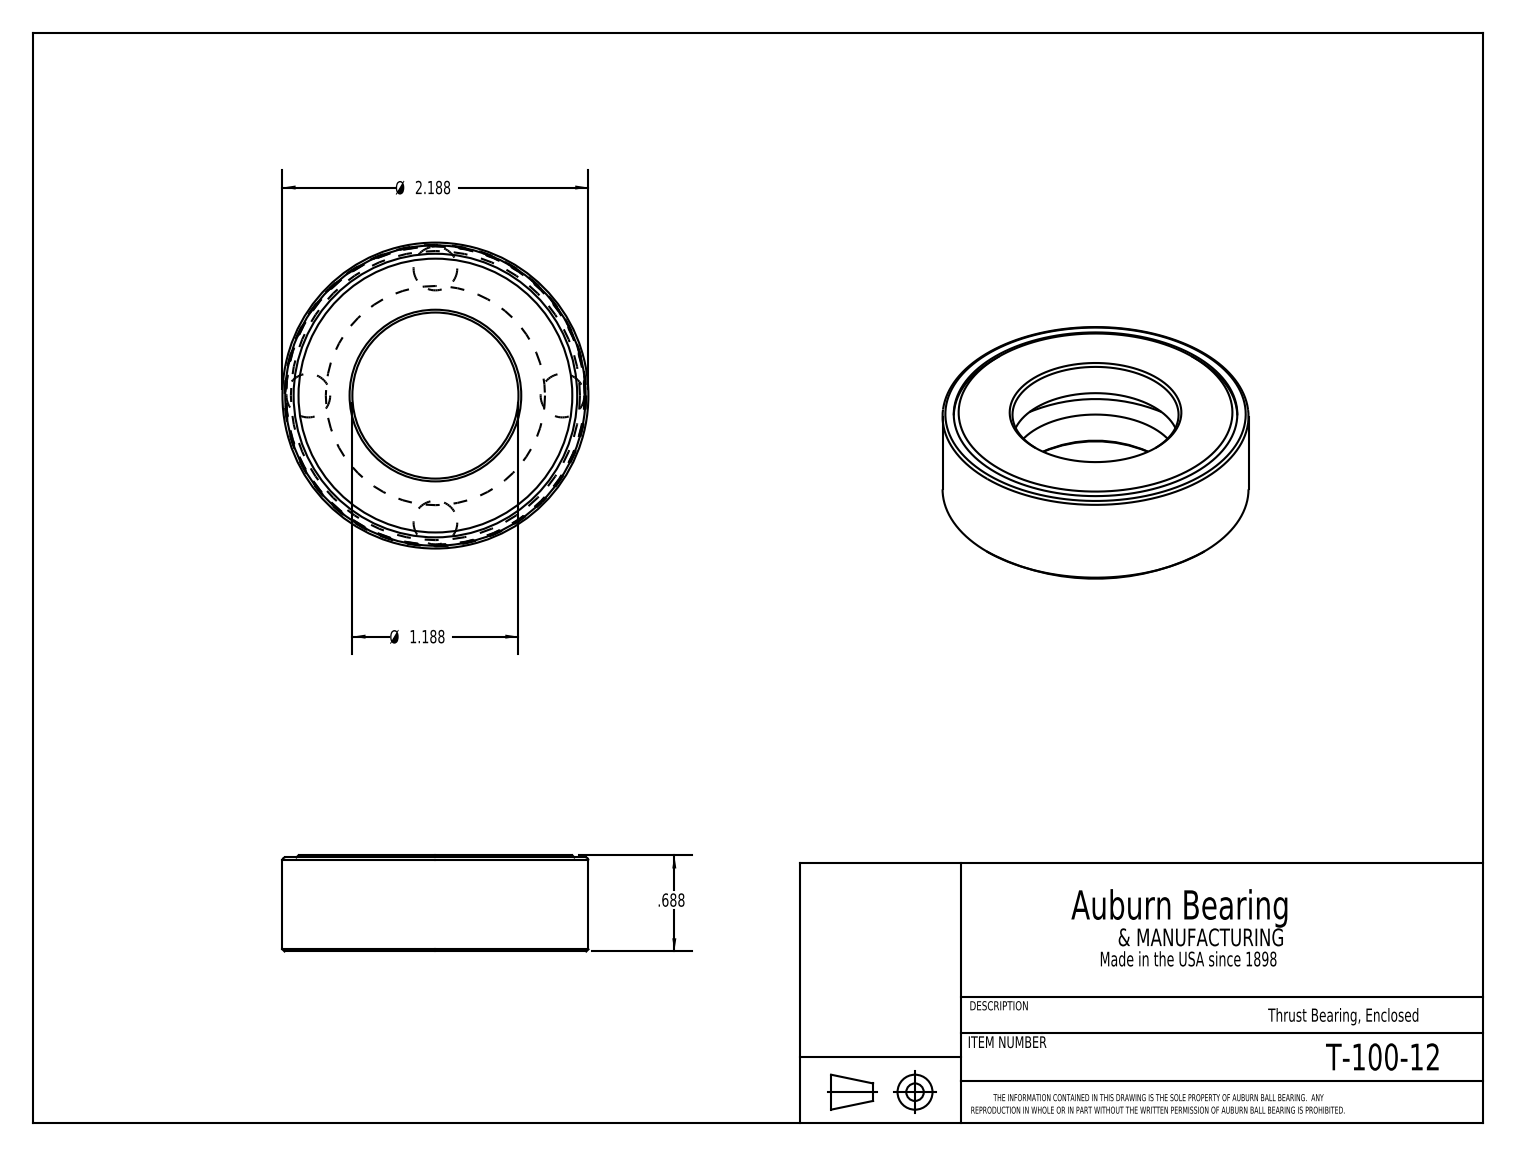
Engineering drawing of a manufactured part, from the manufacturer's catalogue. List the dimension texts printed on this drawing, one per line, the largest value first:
Ø 2.188
Ø 1.188
.688
